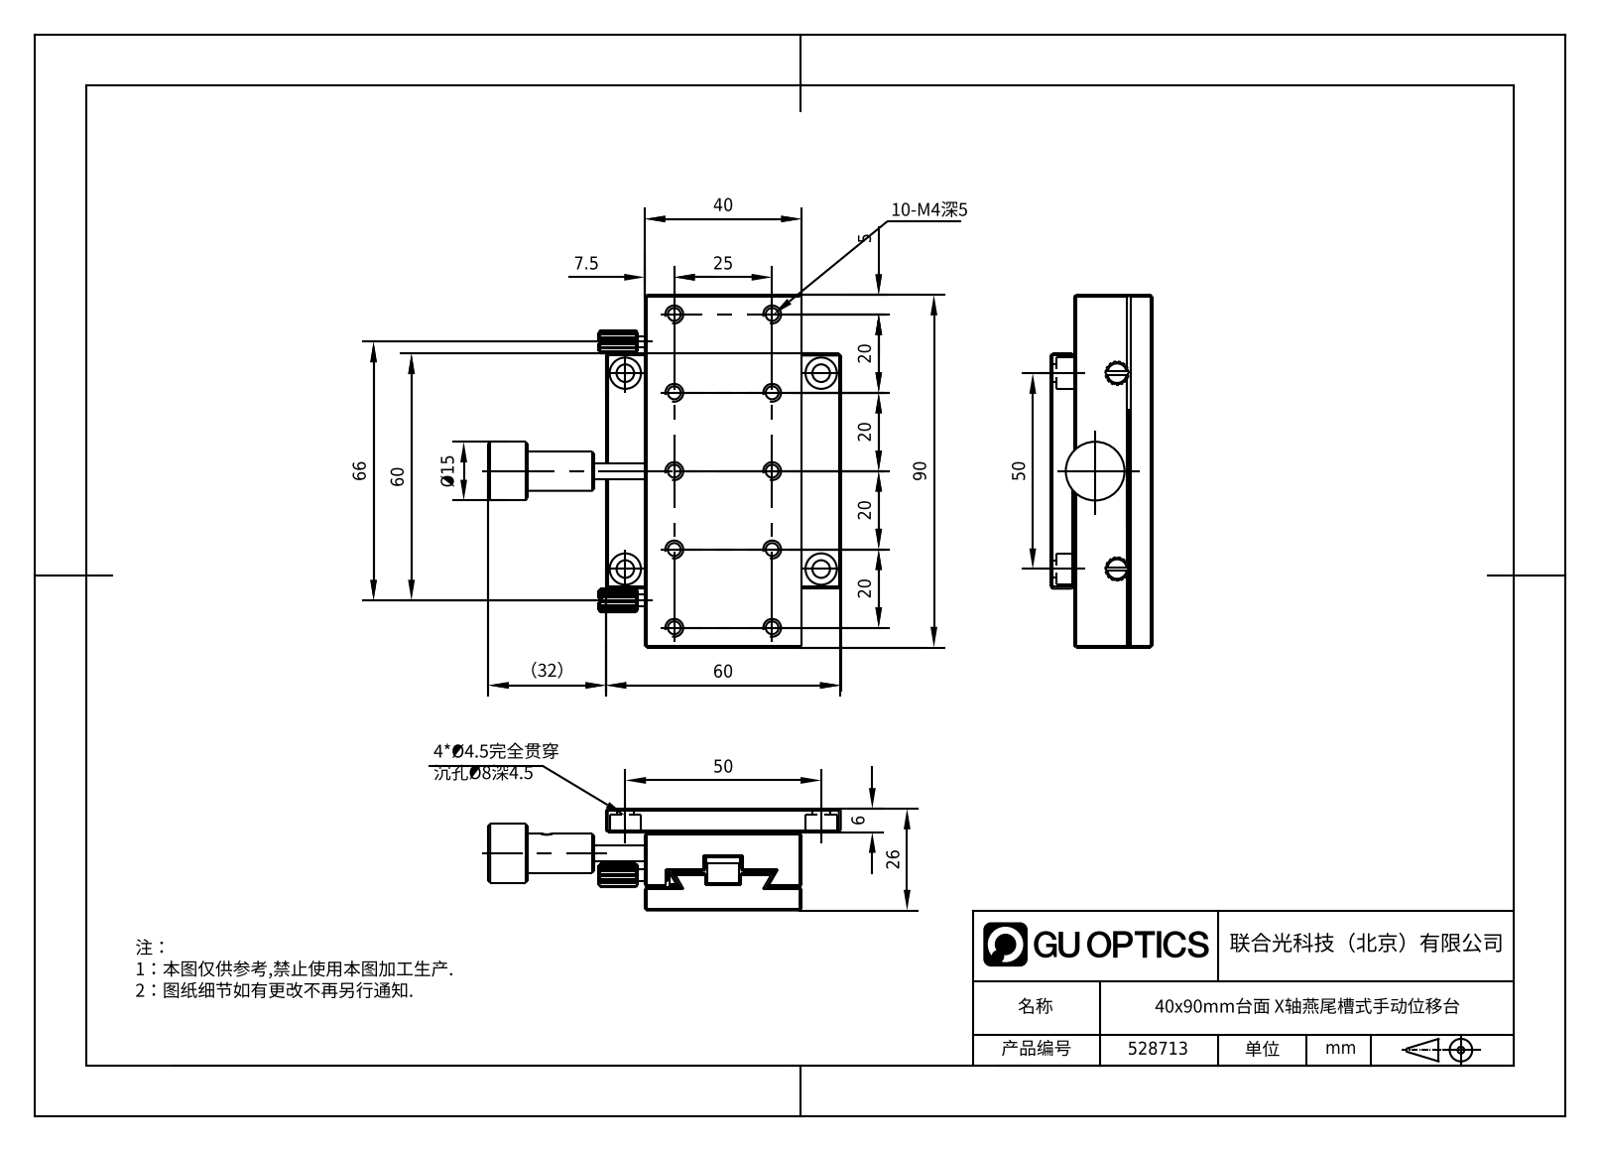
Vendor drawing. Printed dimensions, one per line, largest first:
90
66
60
60
50
50
40
（32）
26
25
20
20
20
20
Ø15
7.5
6
5
